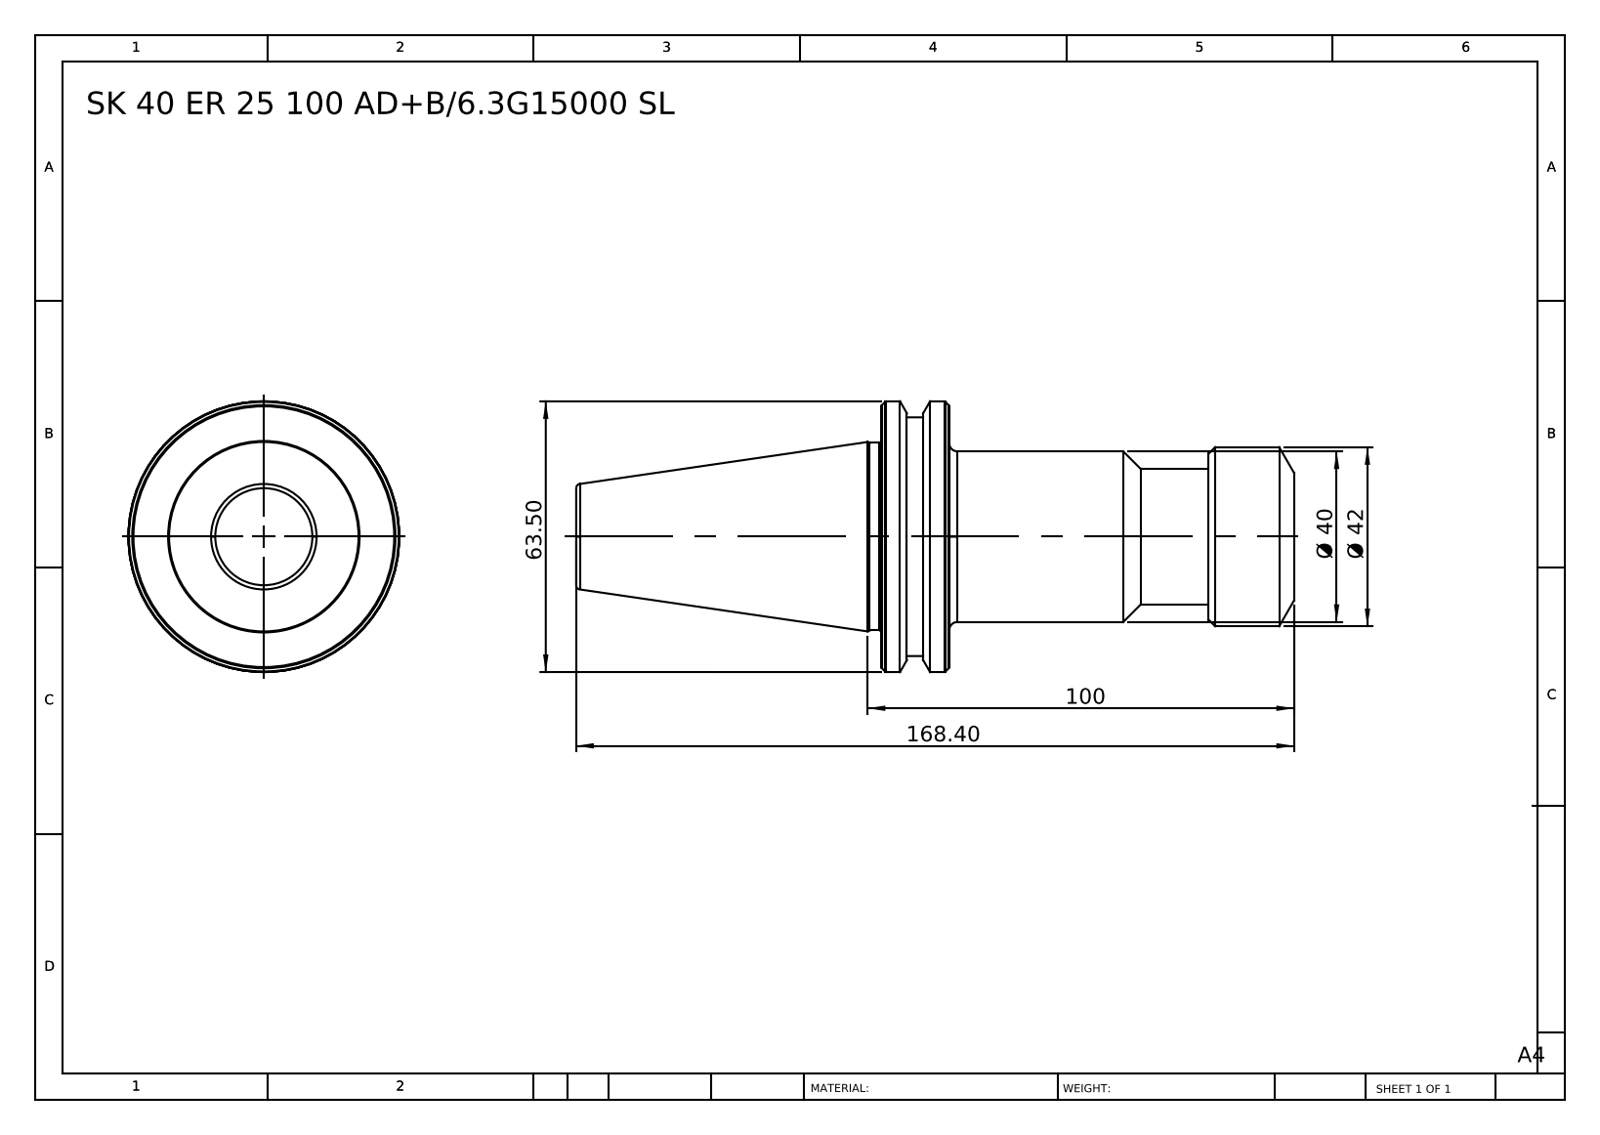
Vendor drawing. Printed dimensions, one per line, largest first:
168.40
100
63.50
Ø 42
Ø 40
